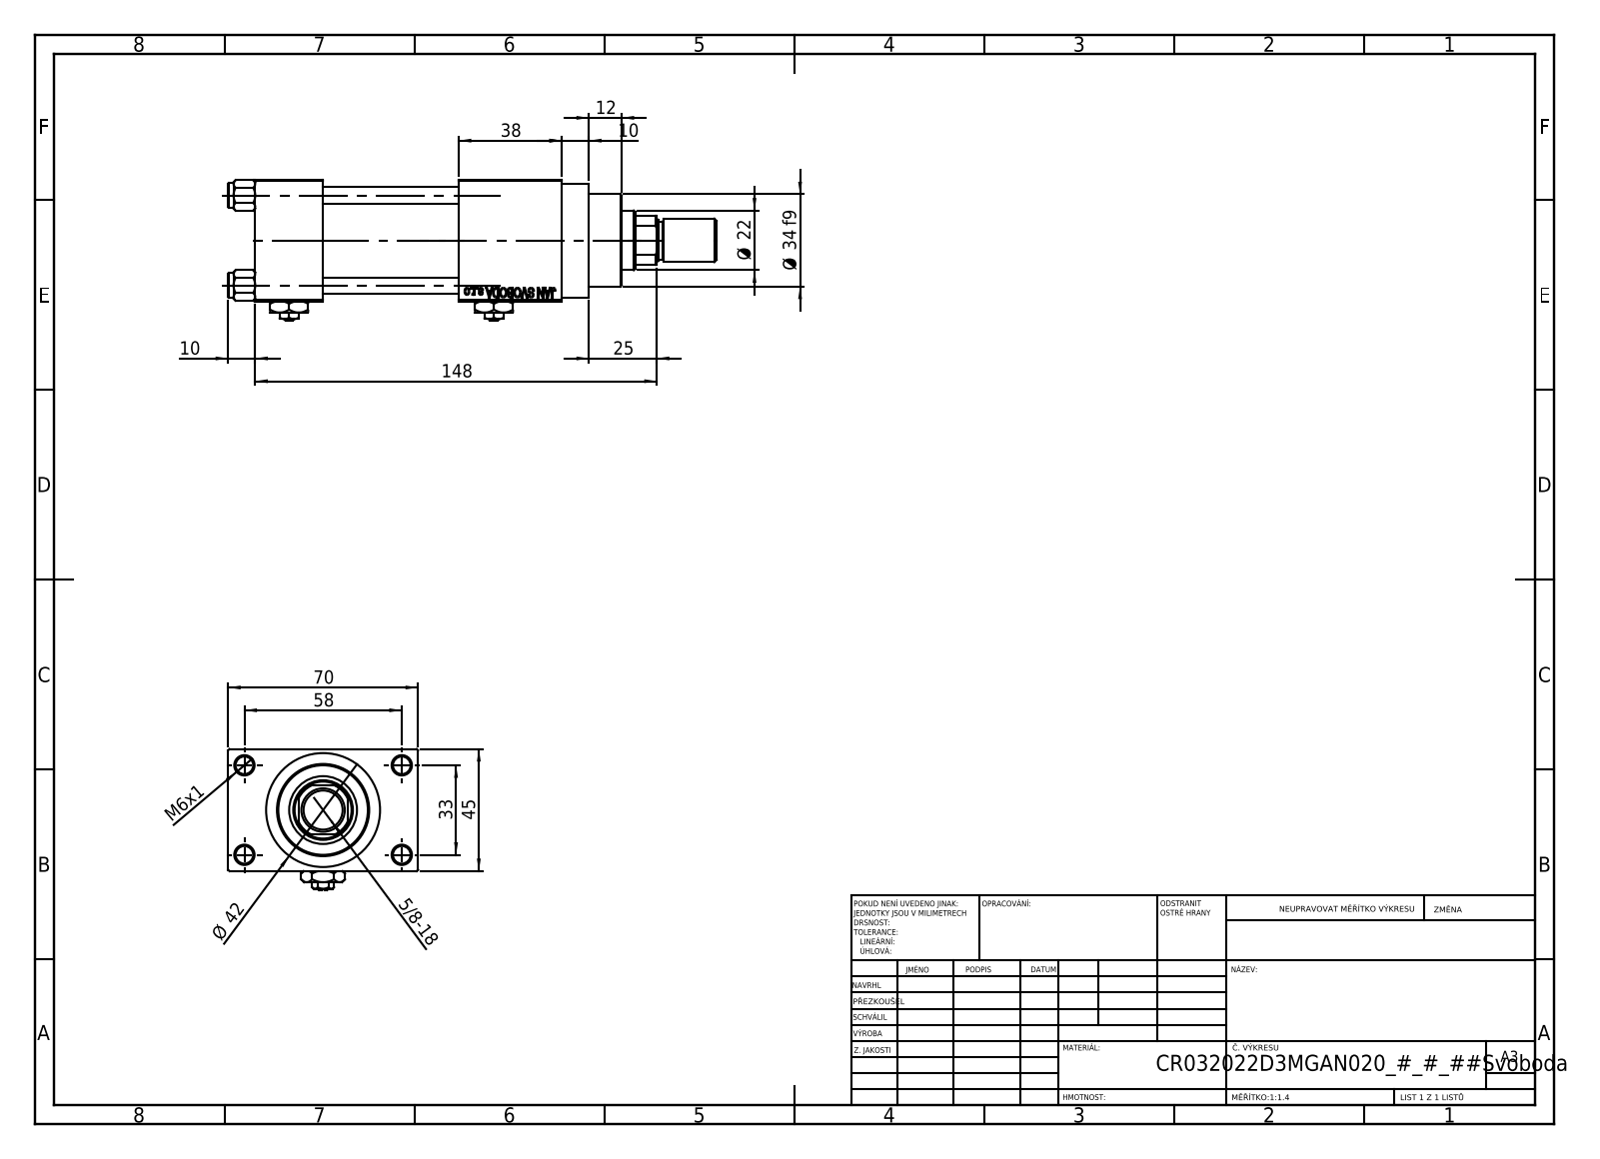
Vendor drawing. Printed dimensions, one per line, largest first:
148
70
58
45
Ø 42
38
Ø 34 f9
33
25
Ø 22
12
10
10
M6x1
5/8-18
